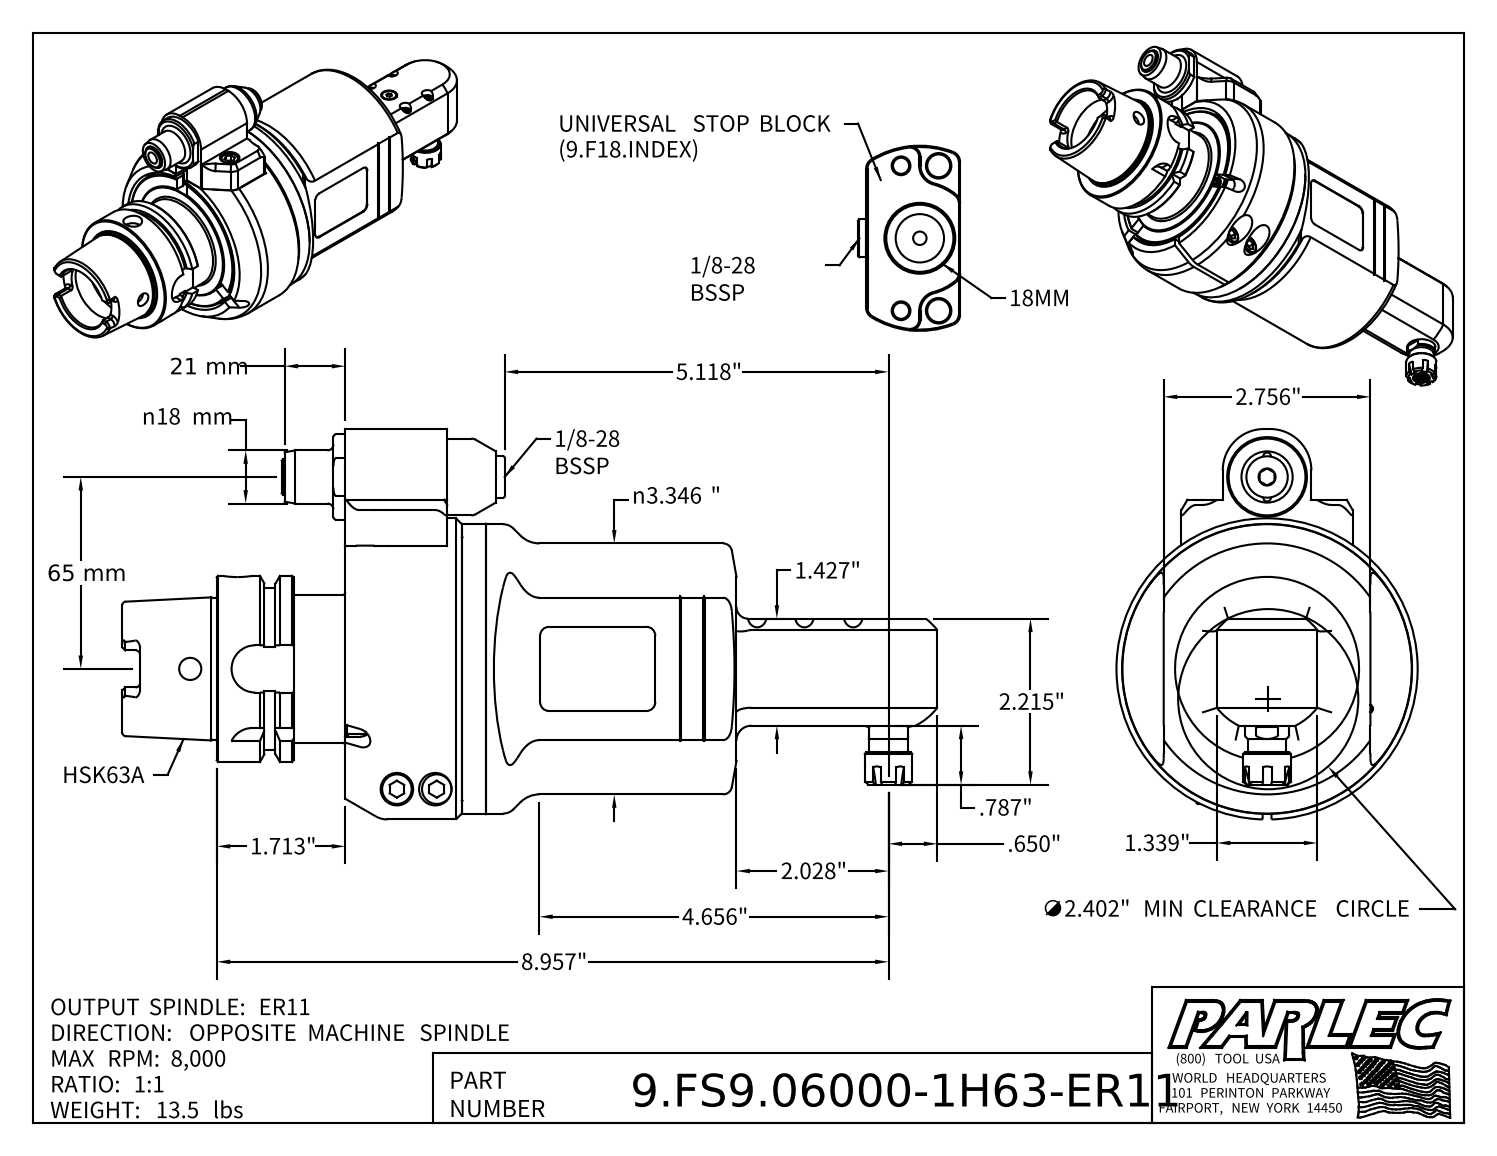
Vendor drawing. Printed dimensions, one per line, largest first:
65 mm
21 mm
n18 mm
8.957"
5.118"
4.656"
n3.346"
2.756"
∅2.402" MIN CLEARANCE CIRCLE
2.215"
2.028"
1.713"
1.427"
1.339"
.787"
.650"
